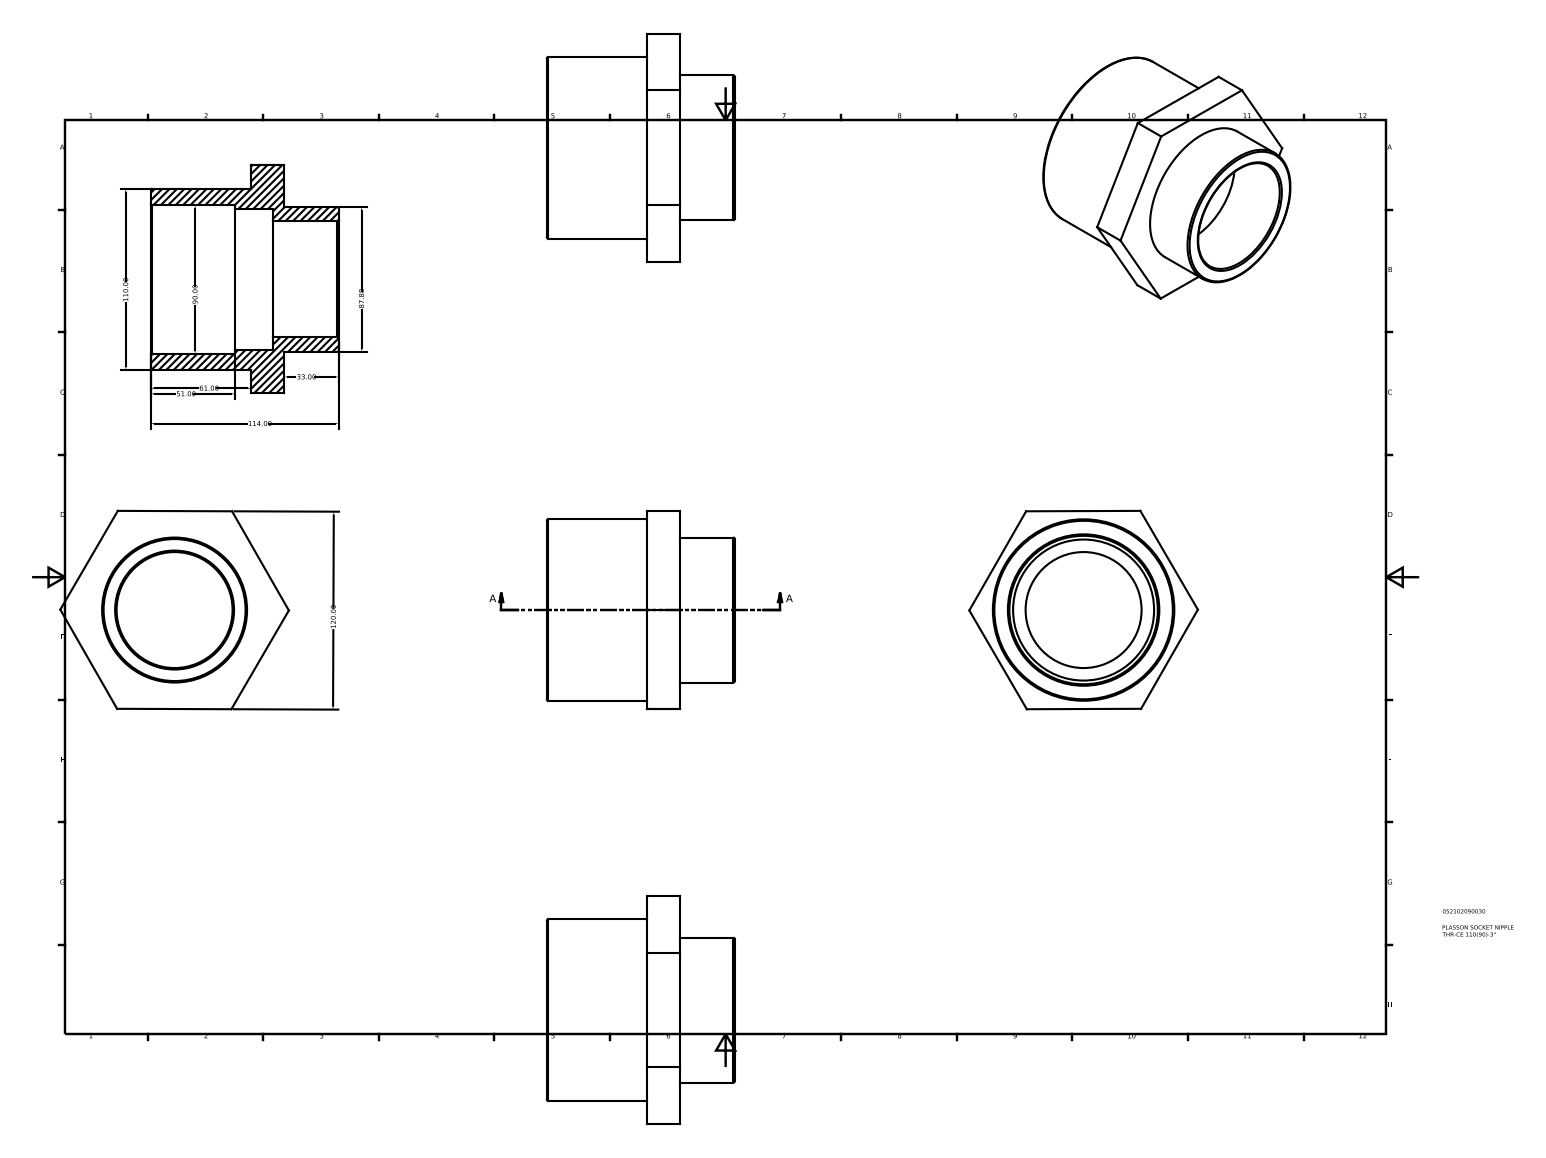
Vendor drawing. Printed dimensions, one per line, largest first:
120.00
114.00
110.00
90.00
87.88
61.00
51.00
33.00
